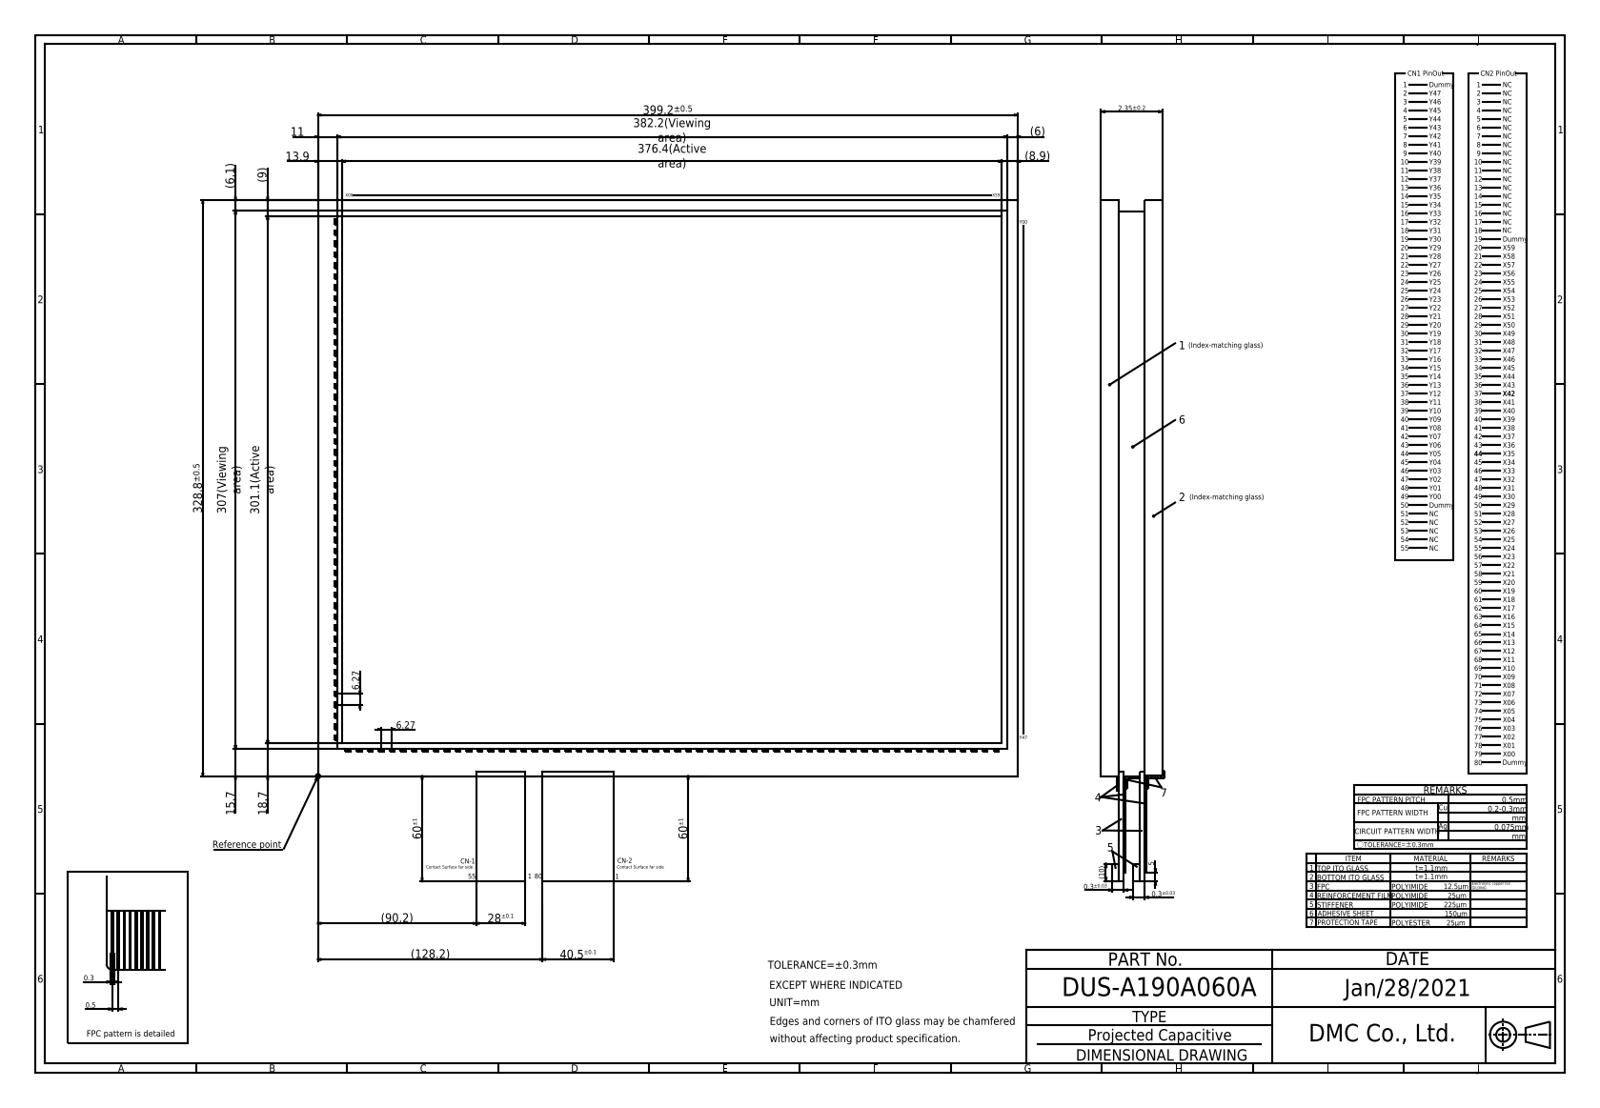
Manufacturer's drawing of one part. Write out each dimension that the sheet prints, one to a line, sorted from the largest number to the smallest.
399.2±0.5
382.2(Viewing area)
376.4(Active area)
328.8±0.5
307(Viewing area)
301.1(Active area)
(128.2)
(90.2)
60±1
60±1
40.5±0.1
28±0.1
18.7
15.7
13.9
11
(10)
(9)
(8.9)
6.27
6.27
(6.1)
(6)
5
2.35±0.2
0.5
0.3
0.3±0.03
0.3±0.03
